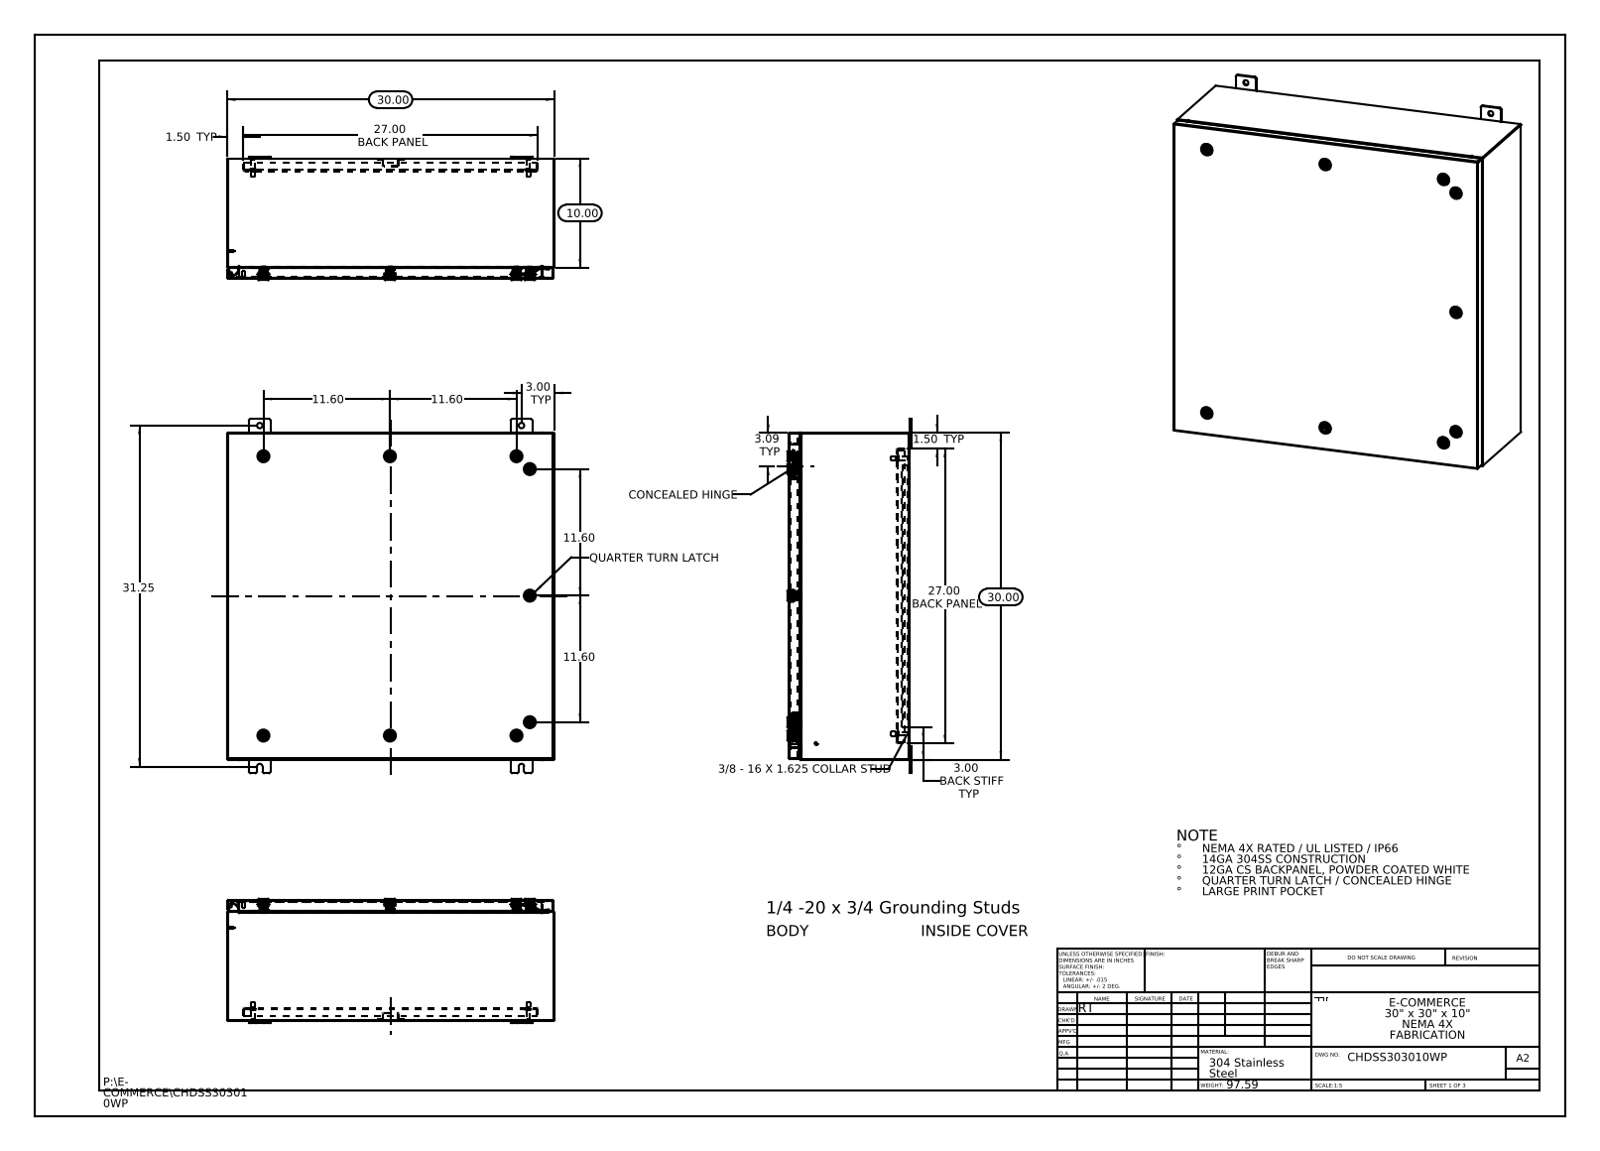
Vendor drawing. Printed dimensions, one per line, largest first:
31.25
30.00
30.00
27.00 BACK PANEL
27.00 BACK PANEL
11.60
11.60
11.60
11.60
10.00
3.09 TYP
3.00 TYP
3.00 BACK STIFF TYP
1.50 TYP
1.50 TYP
